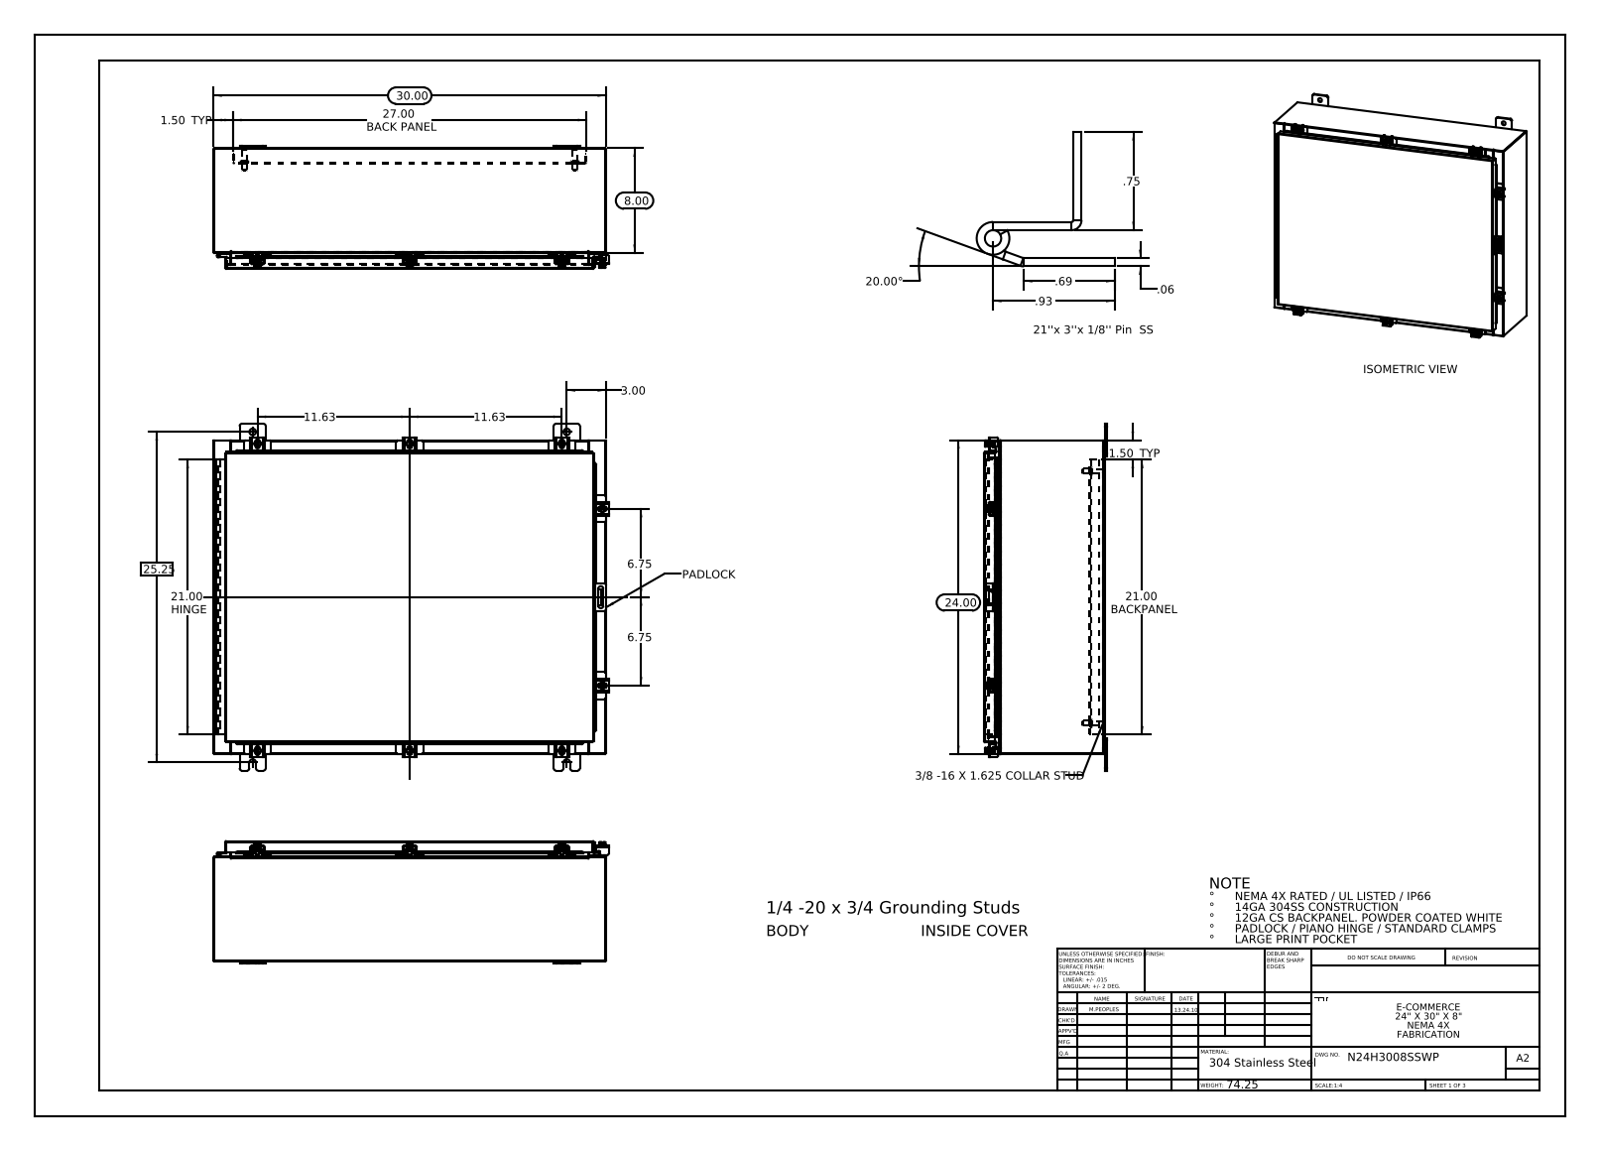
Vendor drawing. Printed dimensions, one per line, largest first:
30.00
27.00 BACK PANEL
25.25
24.00
21.00 HINGE
21.00 BACKPANEL
20.00°
11.63
11.63
8.00
6.75
6.75
3.00
1.50 TYP
1.50 TYP
.93
.75
.69
.06
